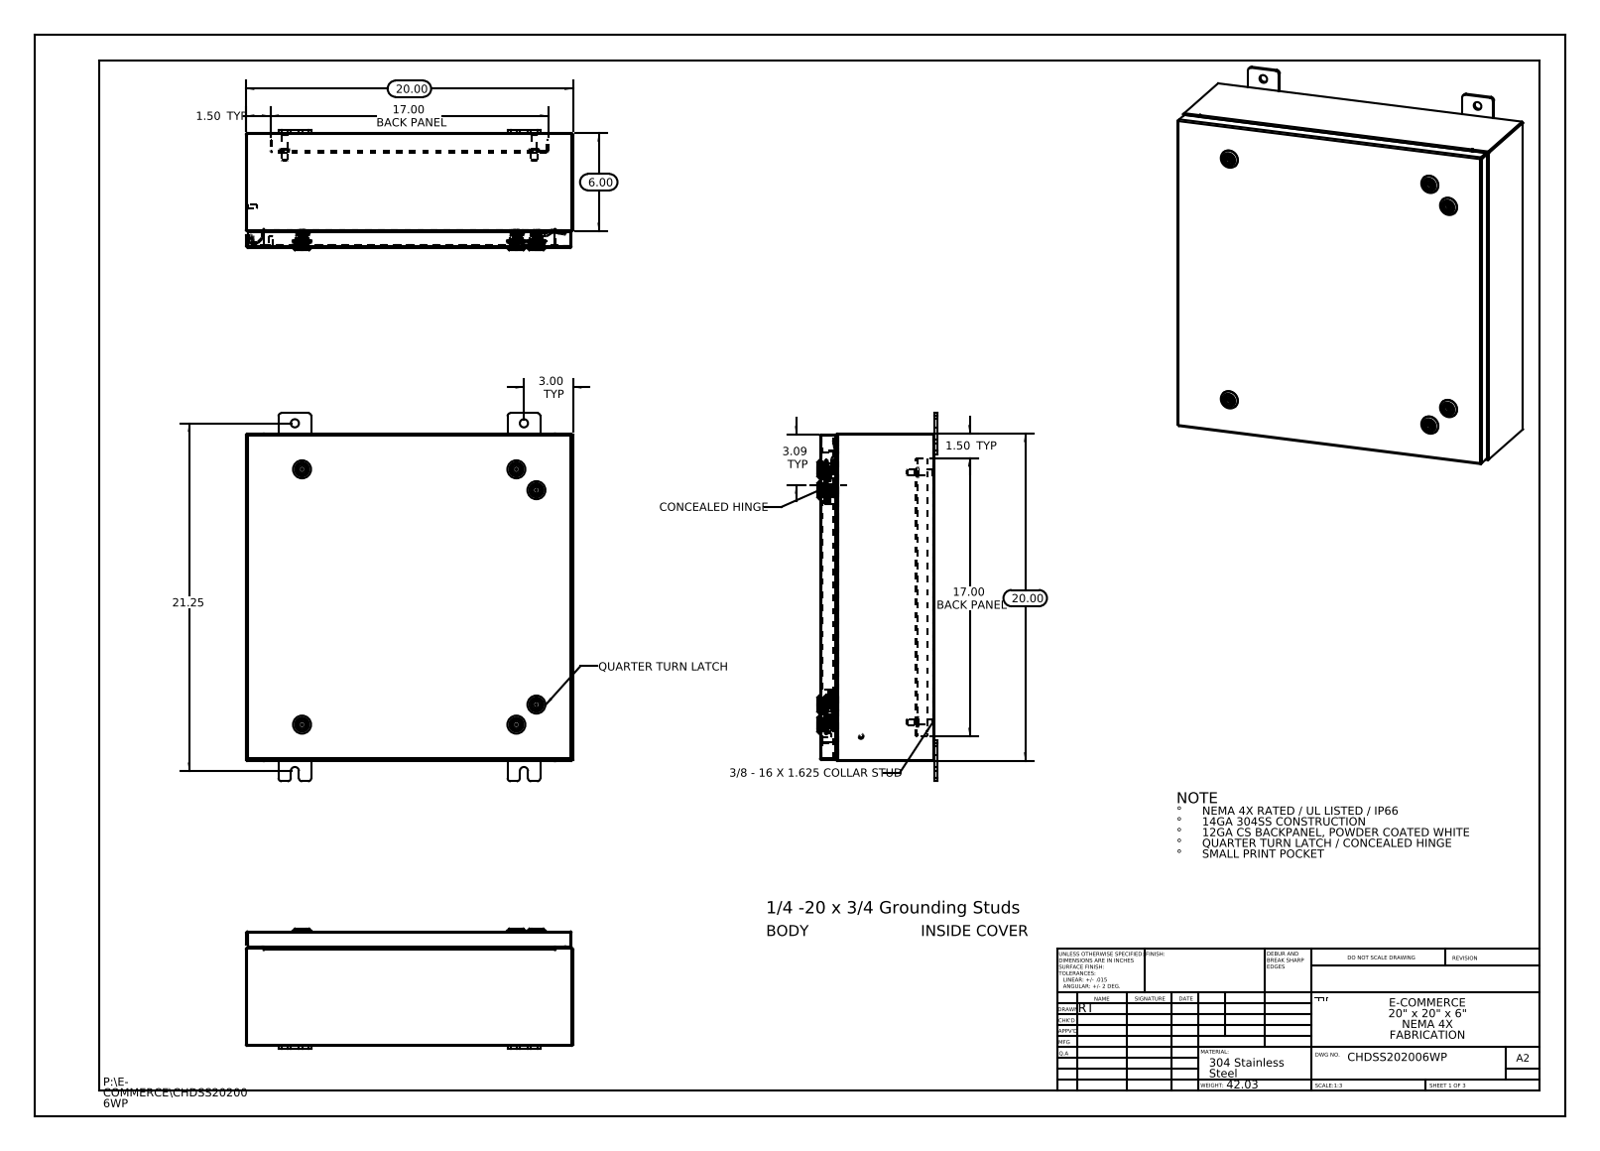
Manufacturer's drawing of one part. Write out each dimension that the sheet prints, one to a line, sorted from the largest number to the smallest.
21.25
20.00
20.00
17.00 BACK PANEL
17.00 BACK PANEL
6.00
3.09 TYP
3.00 TYP
1.50 TYP
1.50 TYP
